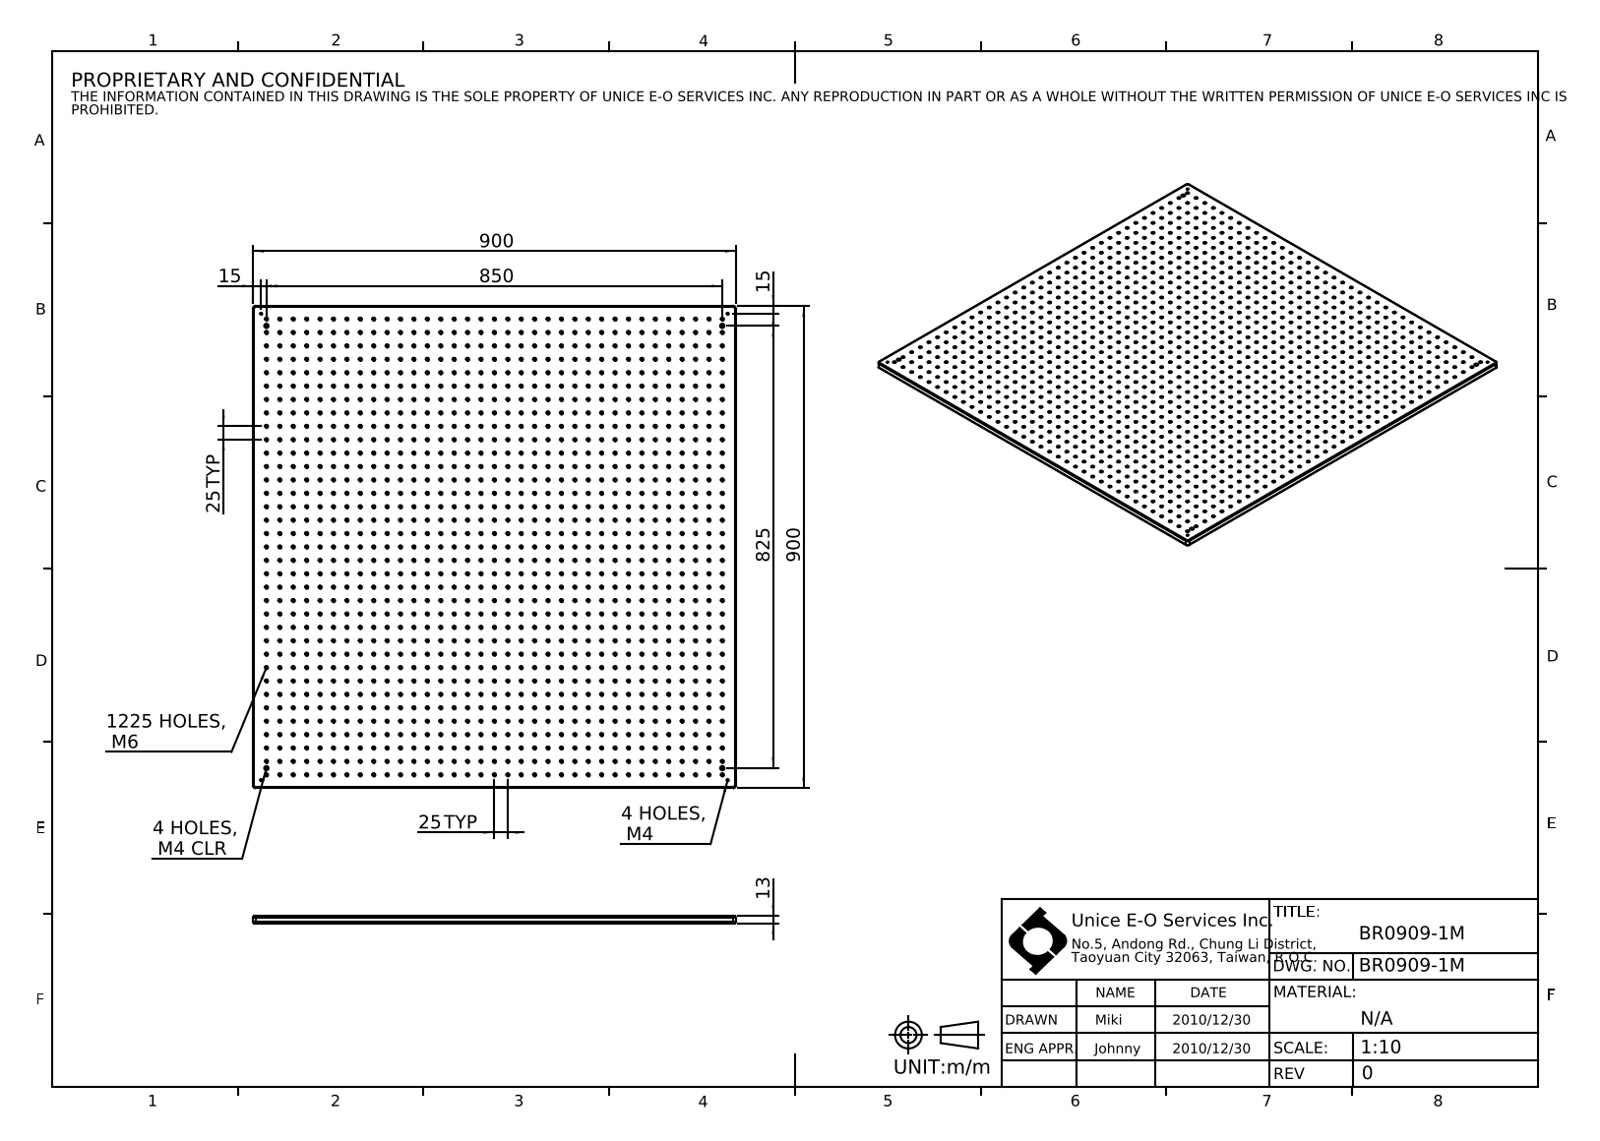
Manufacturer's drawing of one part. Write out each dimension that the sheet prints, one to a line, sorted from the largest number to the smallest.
1225 HOLES, M6
900
900
850
825
25 TYP
25 TYP
15
15
13
4 HOLES, M4
4 HOLES, M4 CLR
